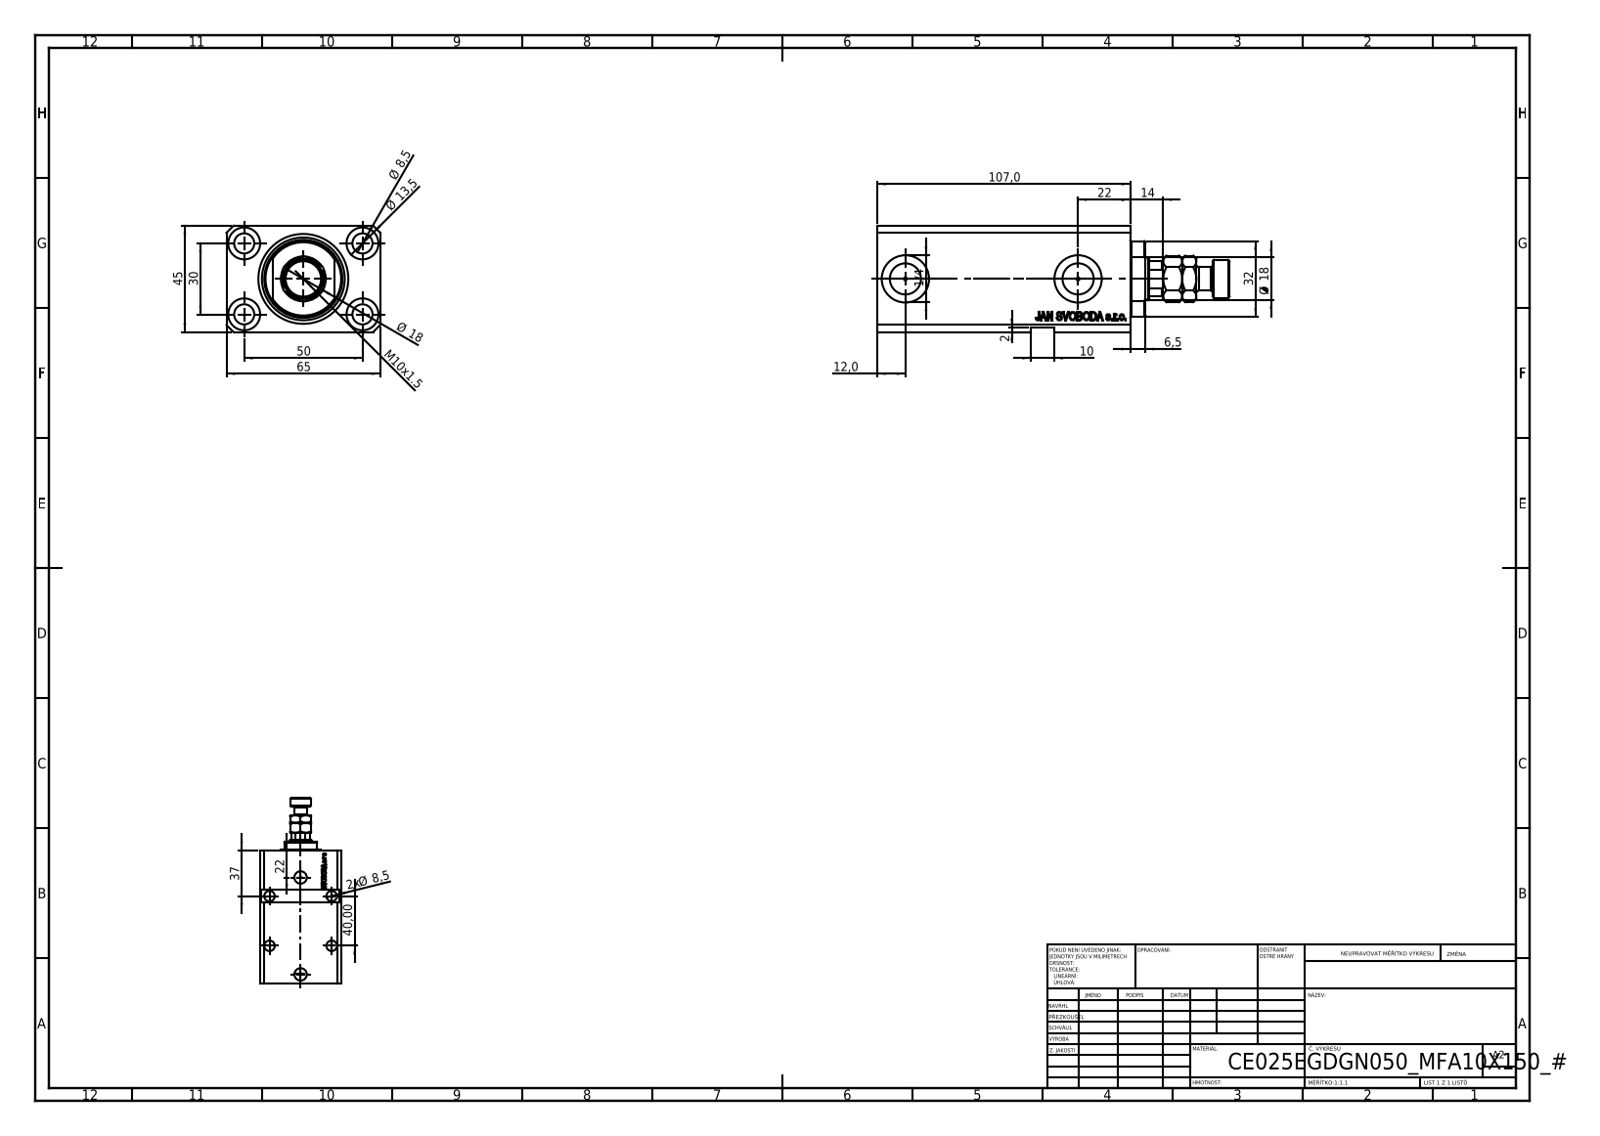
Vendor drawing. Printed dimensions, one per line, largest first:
107,0
65
50
45
40,00
37
32
30
22
22
Ø 18
Ø 18
14
Ø 13,5
12,0
M10x1.5
10
Ø 8,5
2x Ø 8,5
6,5
2
1/4
